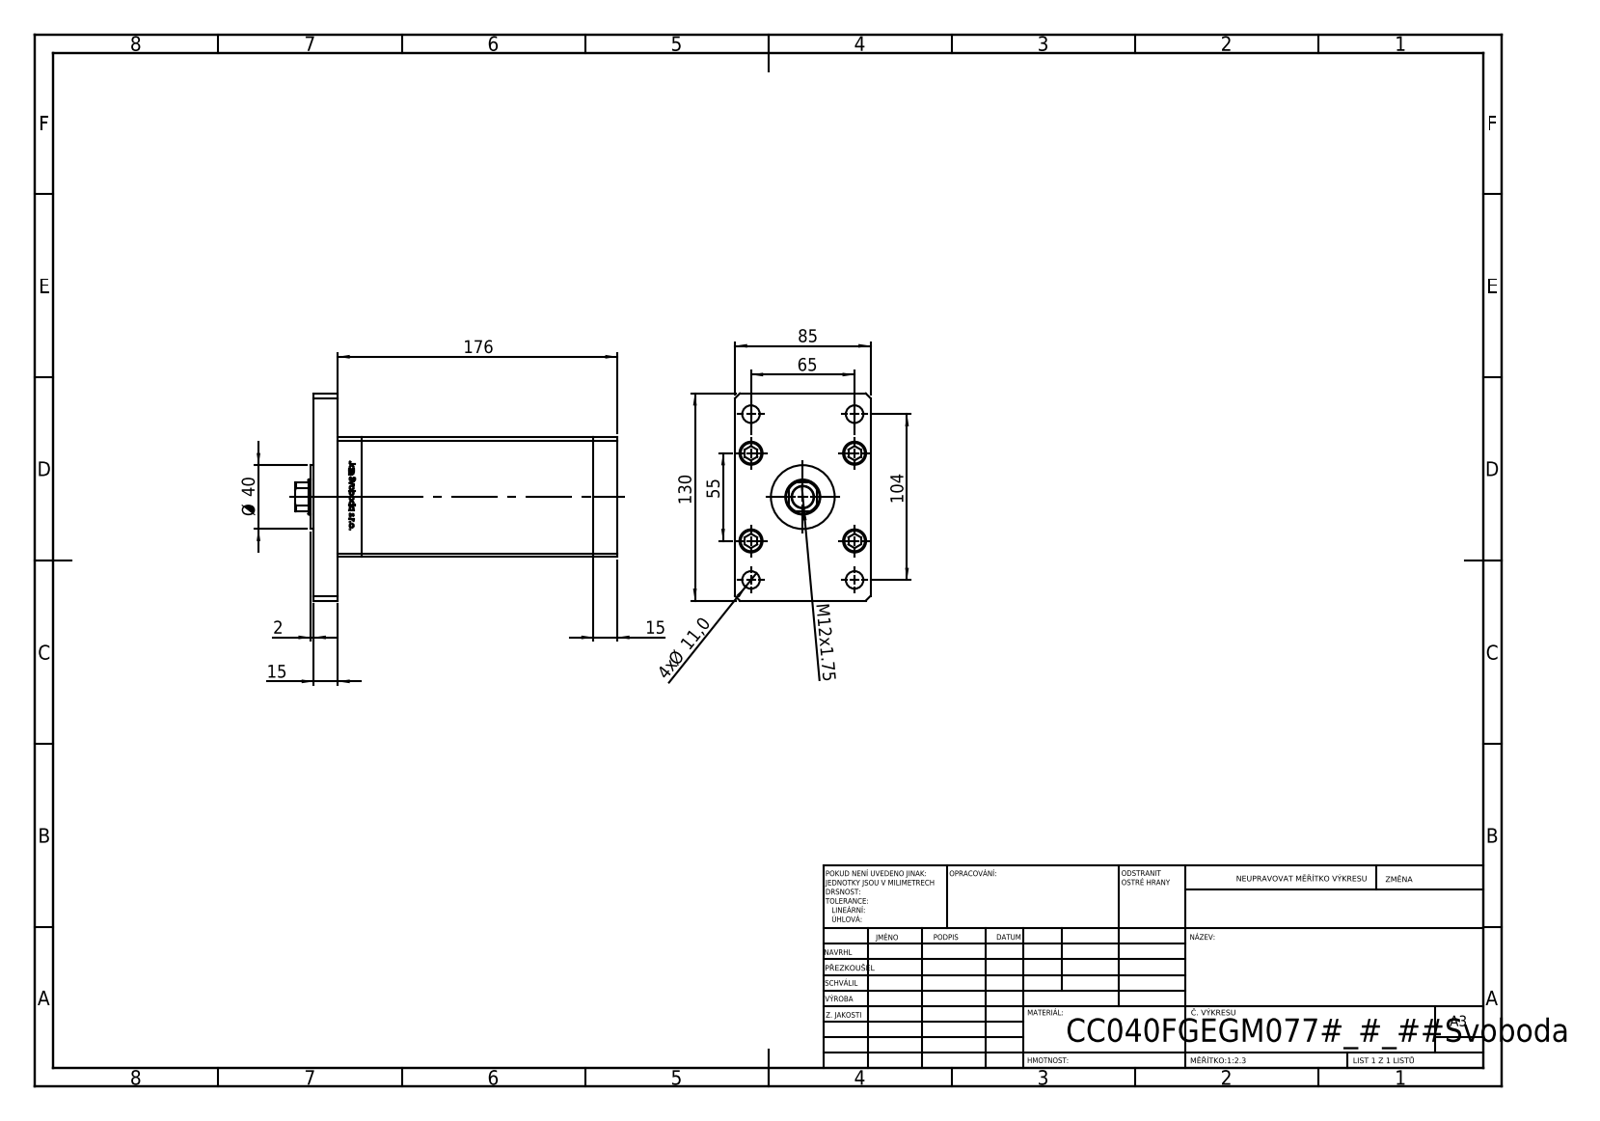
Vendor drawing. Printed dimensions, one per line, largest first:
176
130
104
85
65
55
Ø 40
15
15
M12x1.75
4x Ø 11,0
2
